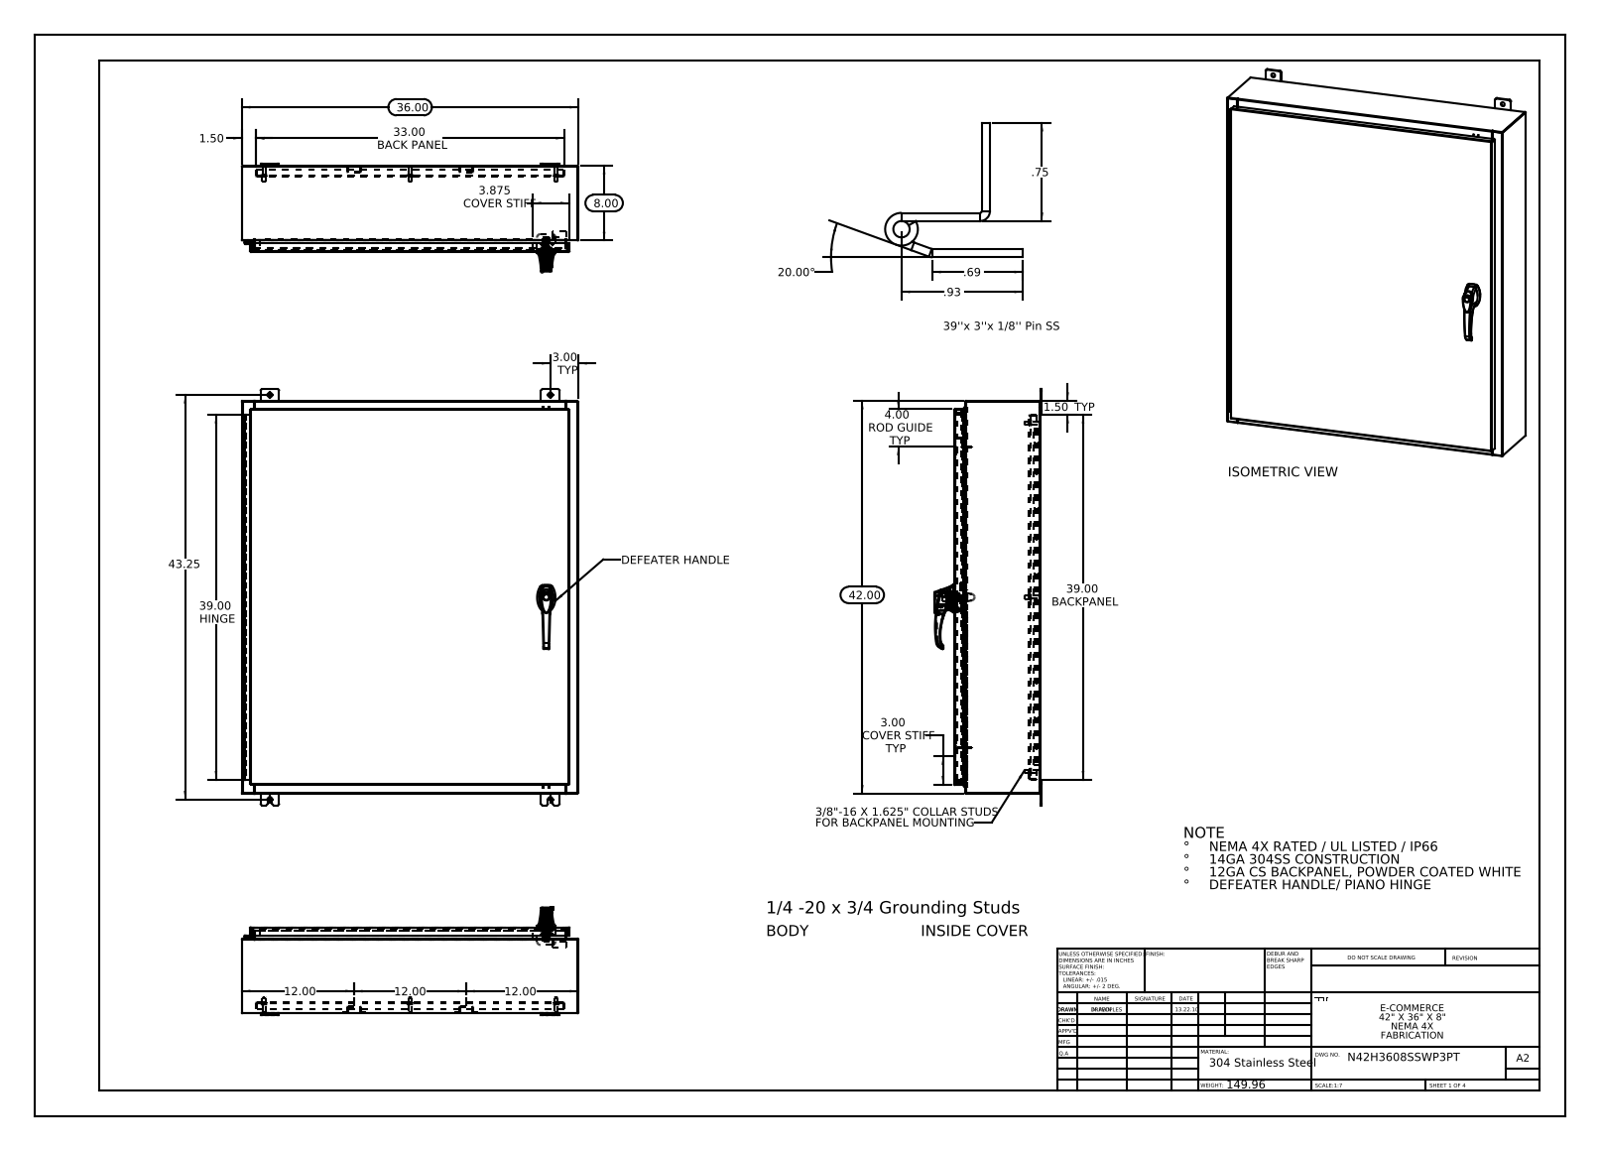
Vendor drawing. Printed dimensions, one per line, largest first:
43.25
42.00
39.00 HINGE
39.00 BACKPANEL
36.00
33.00 BACK PANEL
20.00°
12.00
12.00
12.00
8.00
4.00 ROD GUIDE TYP
3.875 COVER STIFF
3.00 TYP
3.00 COVER STIFF TYP
1.50
1.50 TYP
.93
.75
.69
